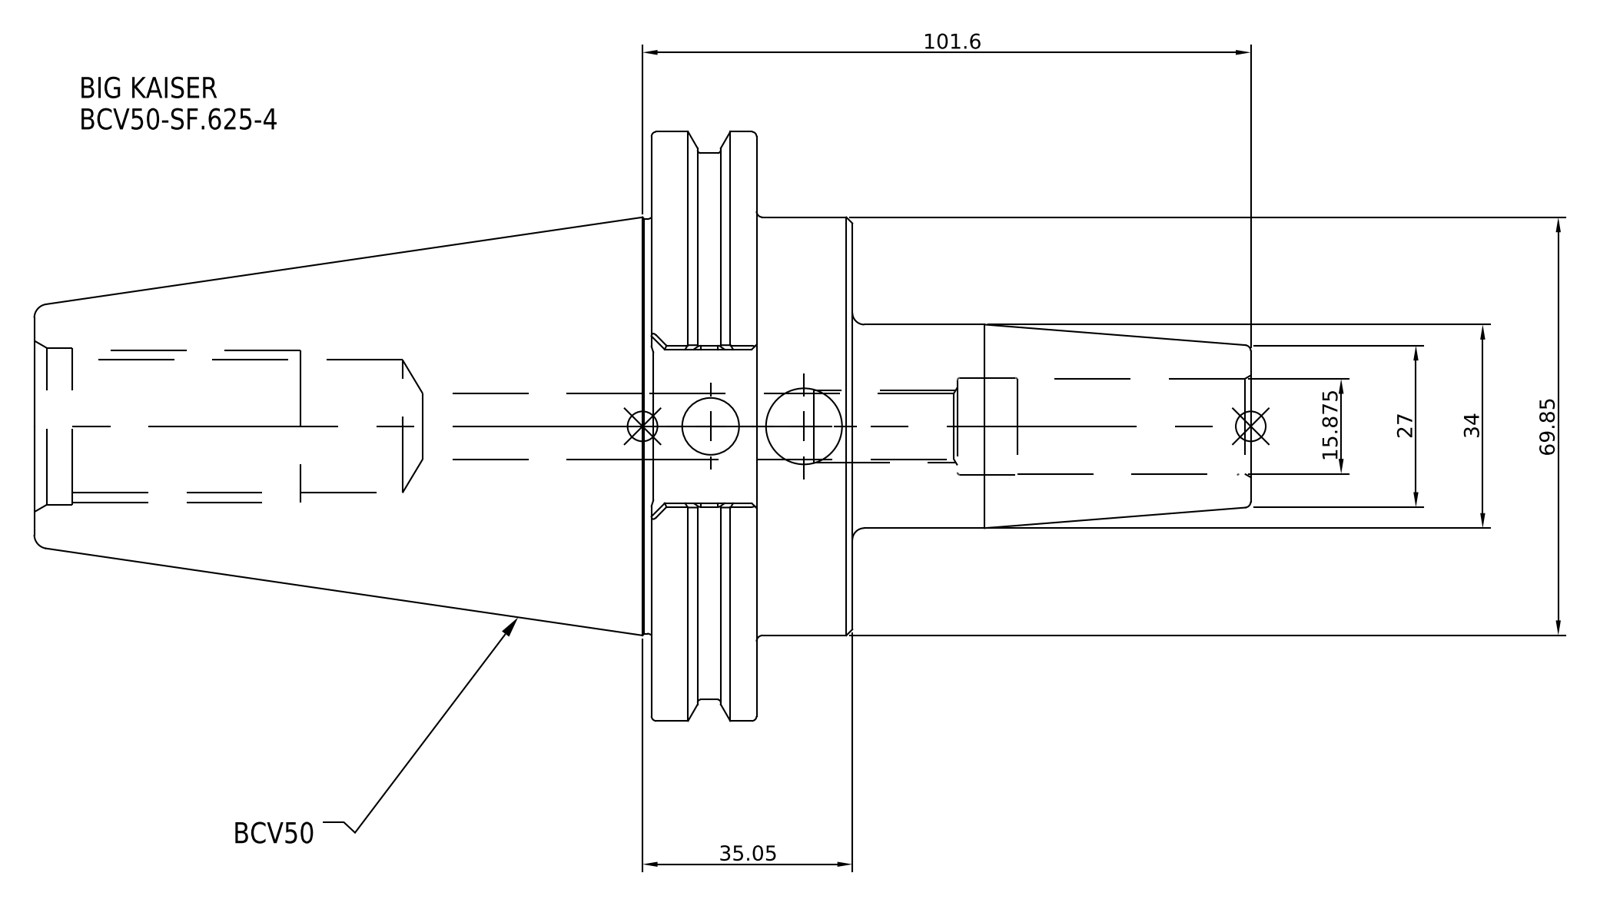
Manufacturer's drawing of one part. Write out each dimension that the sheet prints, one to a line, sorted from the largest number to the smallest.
101.6
69.85
35.05
34
27
15.875
